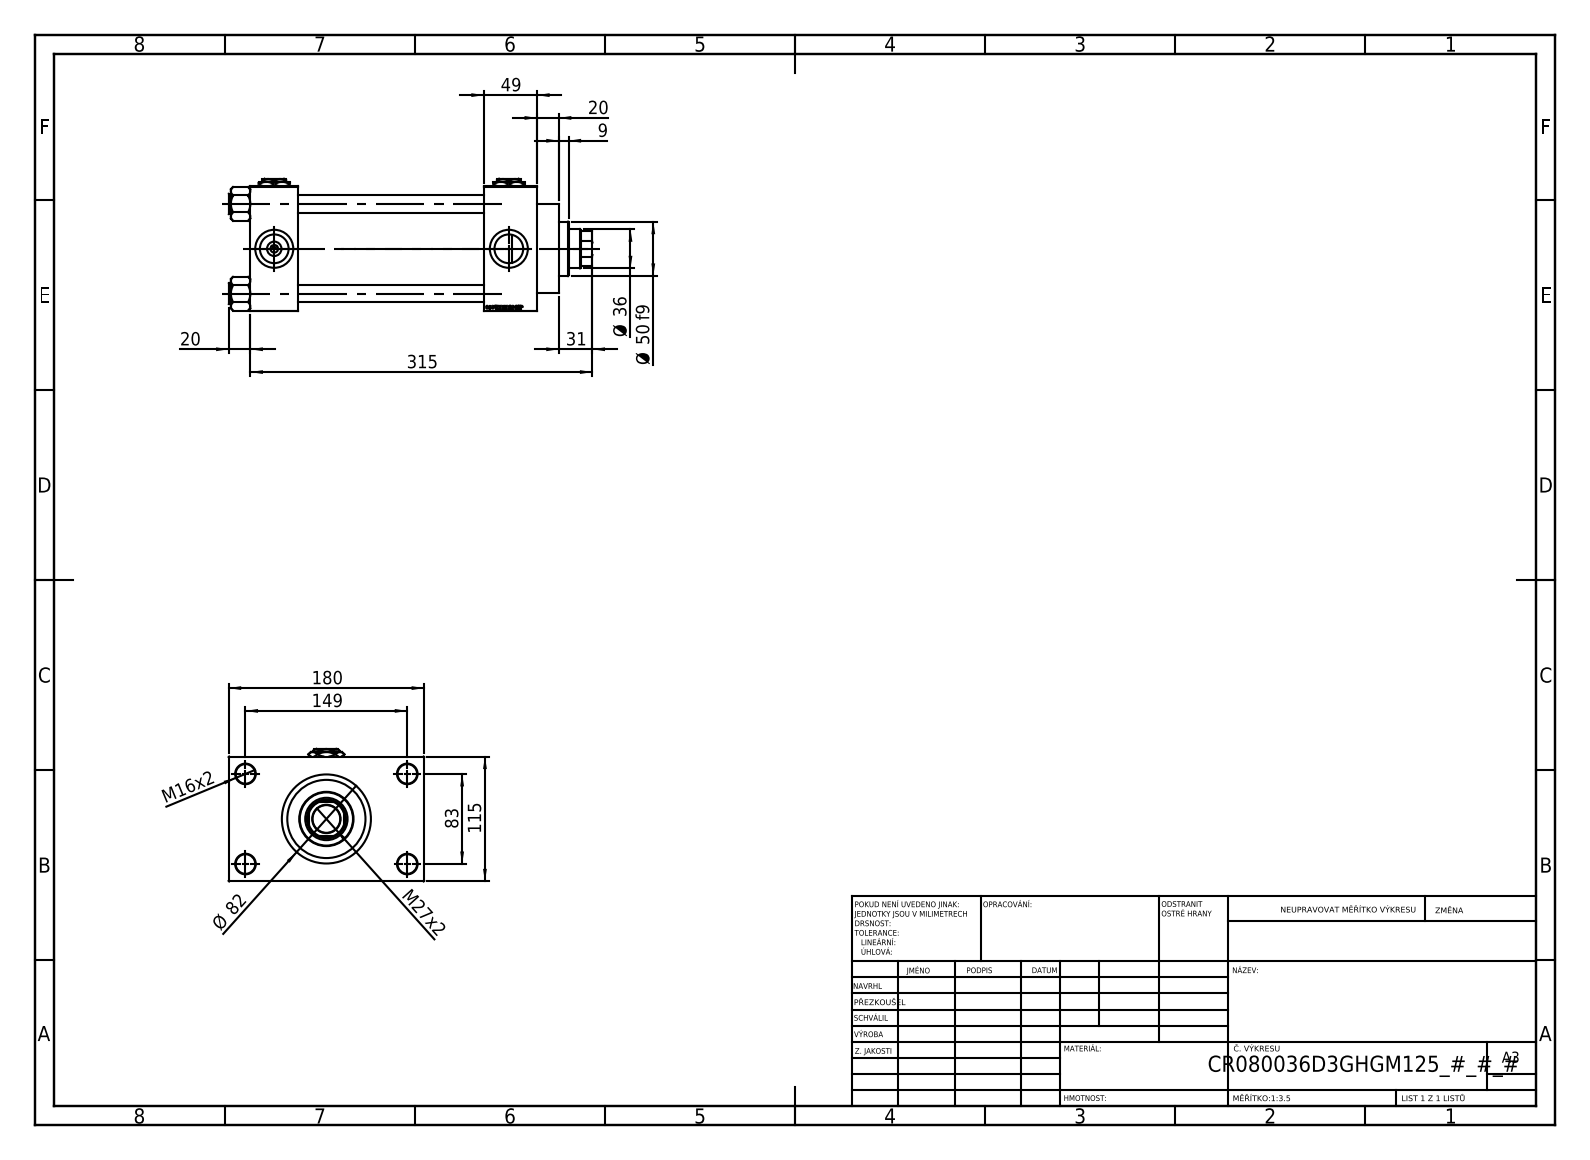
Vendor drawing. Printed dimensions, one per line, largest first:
315
180
149
115
83
Ø 82
Ø 50 f9
49
Ø 36
31
M27x2
20
20
M16x2
9
